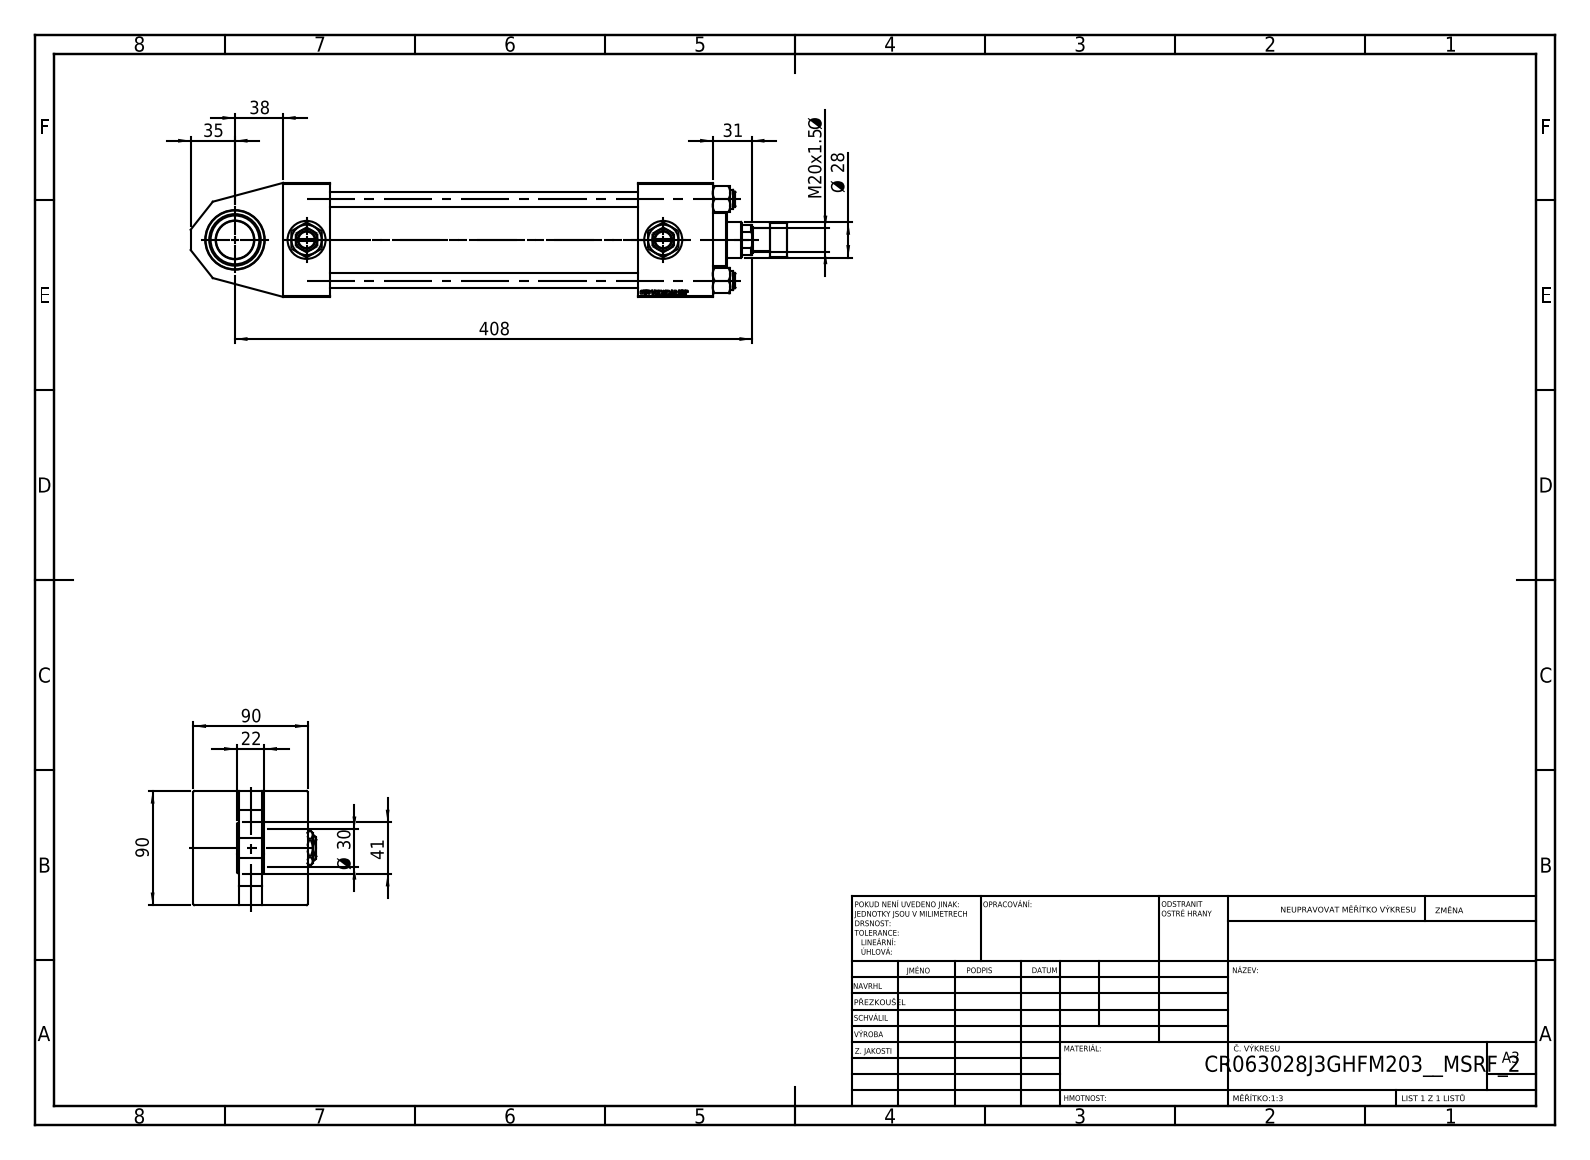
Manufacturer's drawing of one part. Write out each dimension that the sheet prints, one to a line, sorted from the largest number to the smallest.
408
90
90
41
38
35
31
Ø 30
Ø 28
22
M20x1.5 Ø
